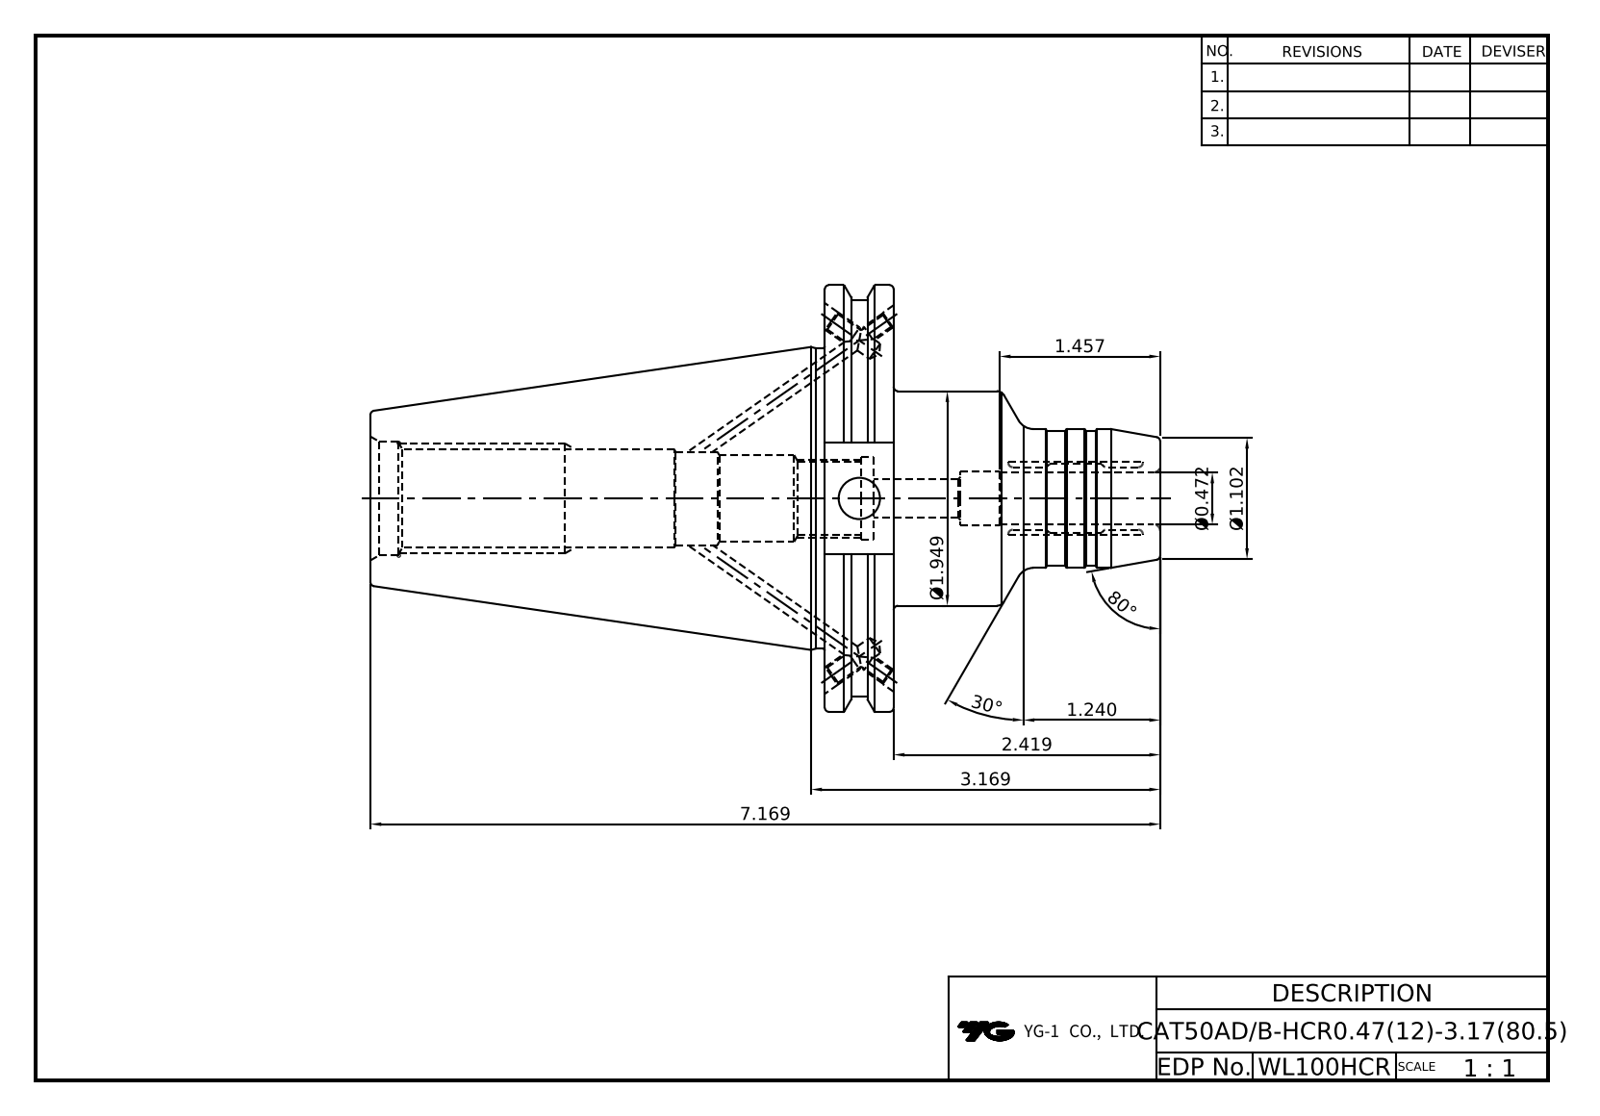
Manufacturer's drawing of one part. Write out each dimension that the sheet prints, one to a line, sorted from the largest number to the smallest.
80°
30°
7.169
3.169
2.419
Ø1.949
1.457
1.240
Ø1.102
Ø0.472
